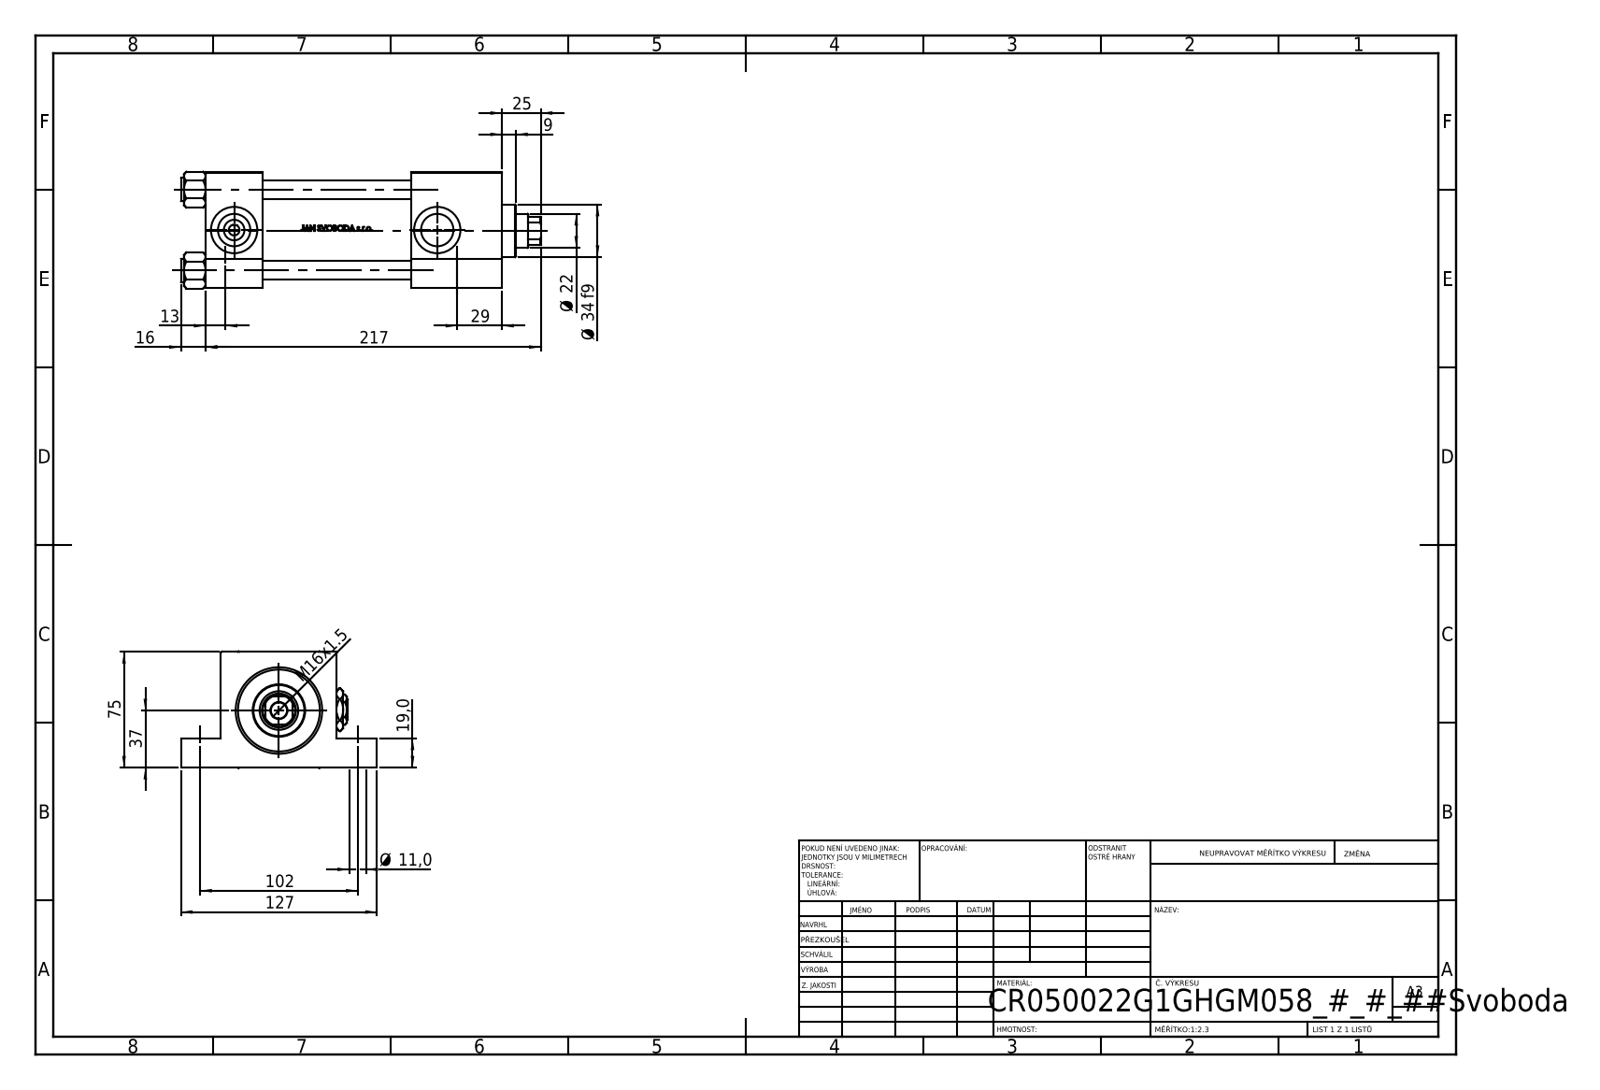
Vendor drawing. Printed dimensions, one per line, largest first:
217
127
102
75
37
Ø 34 f9
29
25
Ø 22
19,0
16
M16x1.5
13
Ø 11,0
9
